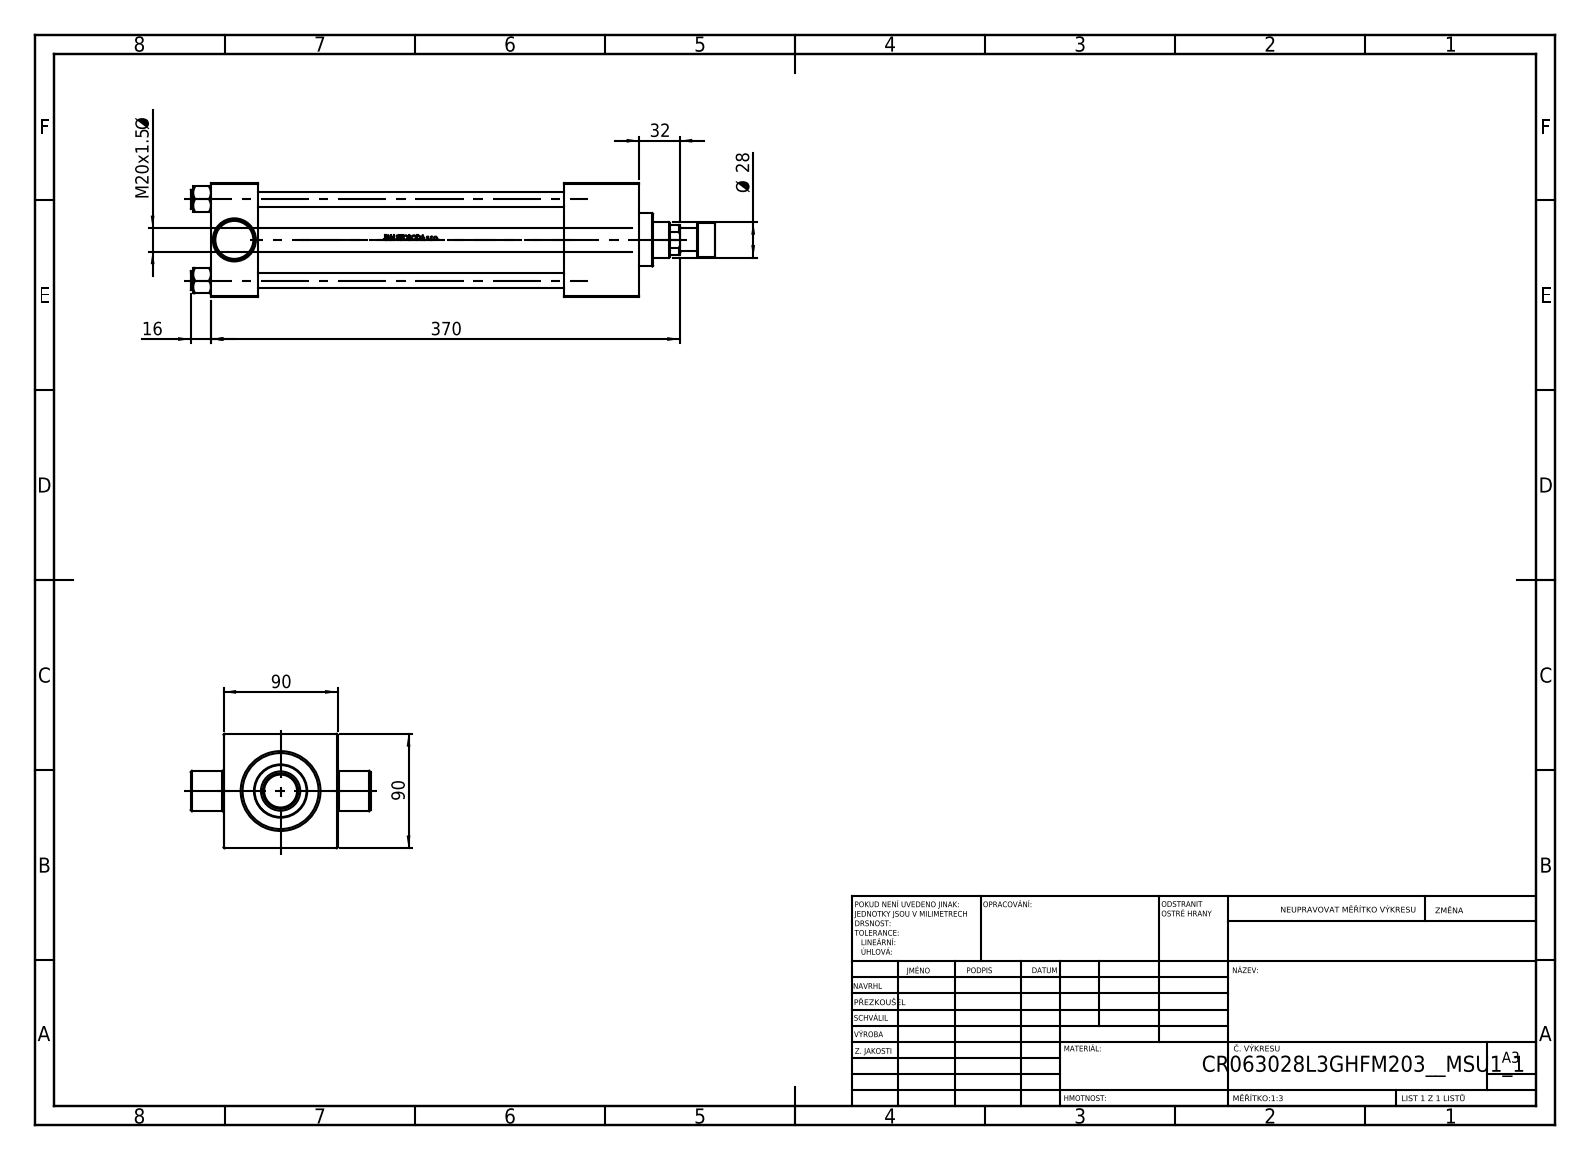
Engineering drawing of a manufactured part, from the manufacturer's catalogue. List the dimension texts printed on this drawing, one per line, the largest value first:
370
90
90
32
Ø 28
M20x1.5 Ø
16
